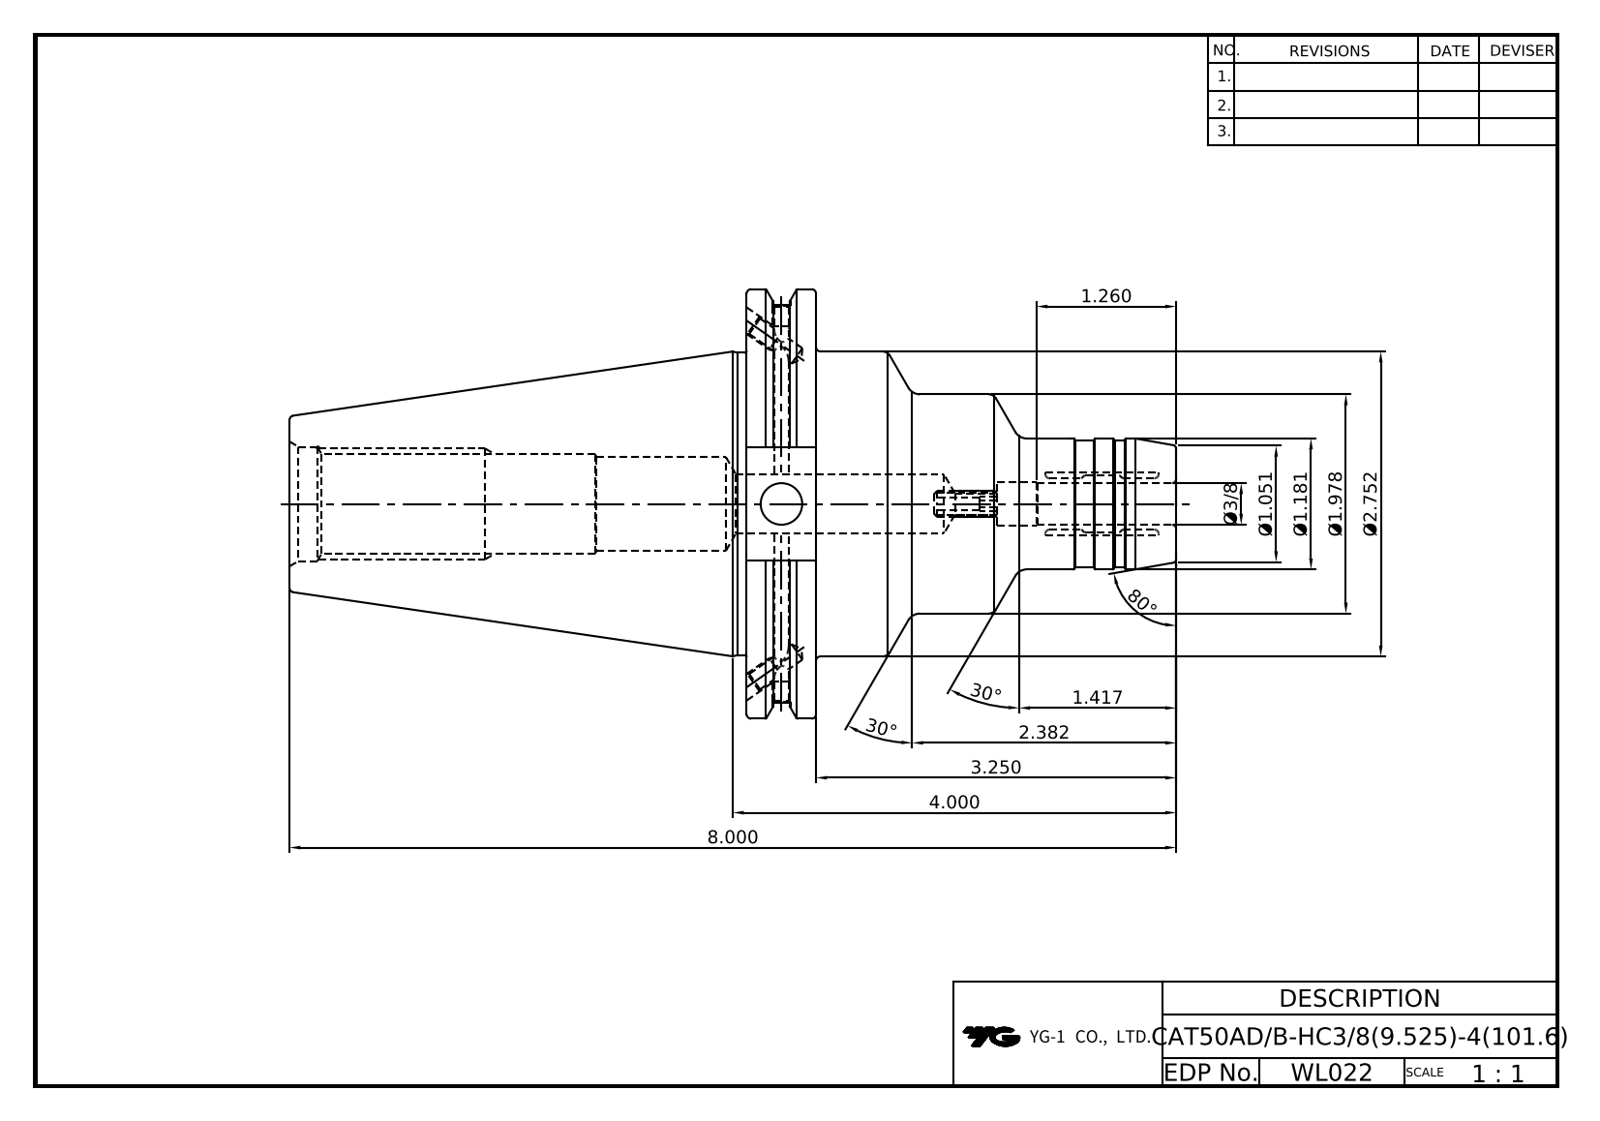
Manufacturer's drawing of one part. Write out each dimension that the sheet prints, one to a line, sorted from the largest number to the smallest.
80°
30°
30°
8.000
4.000
3.250
Ø2.752
2.382
Ø1.978
1.417
1.260
Ø1.181
Ø1.051
Ø3/8
